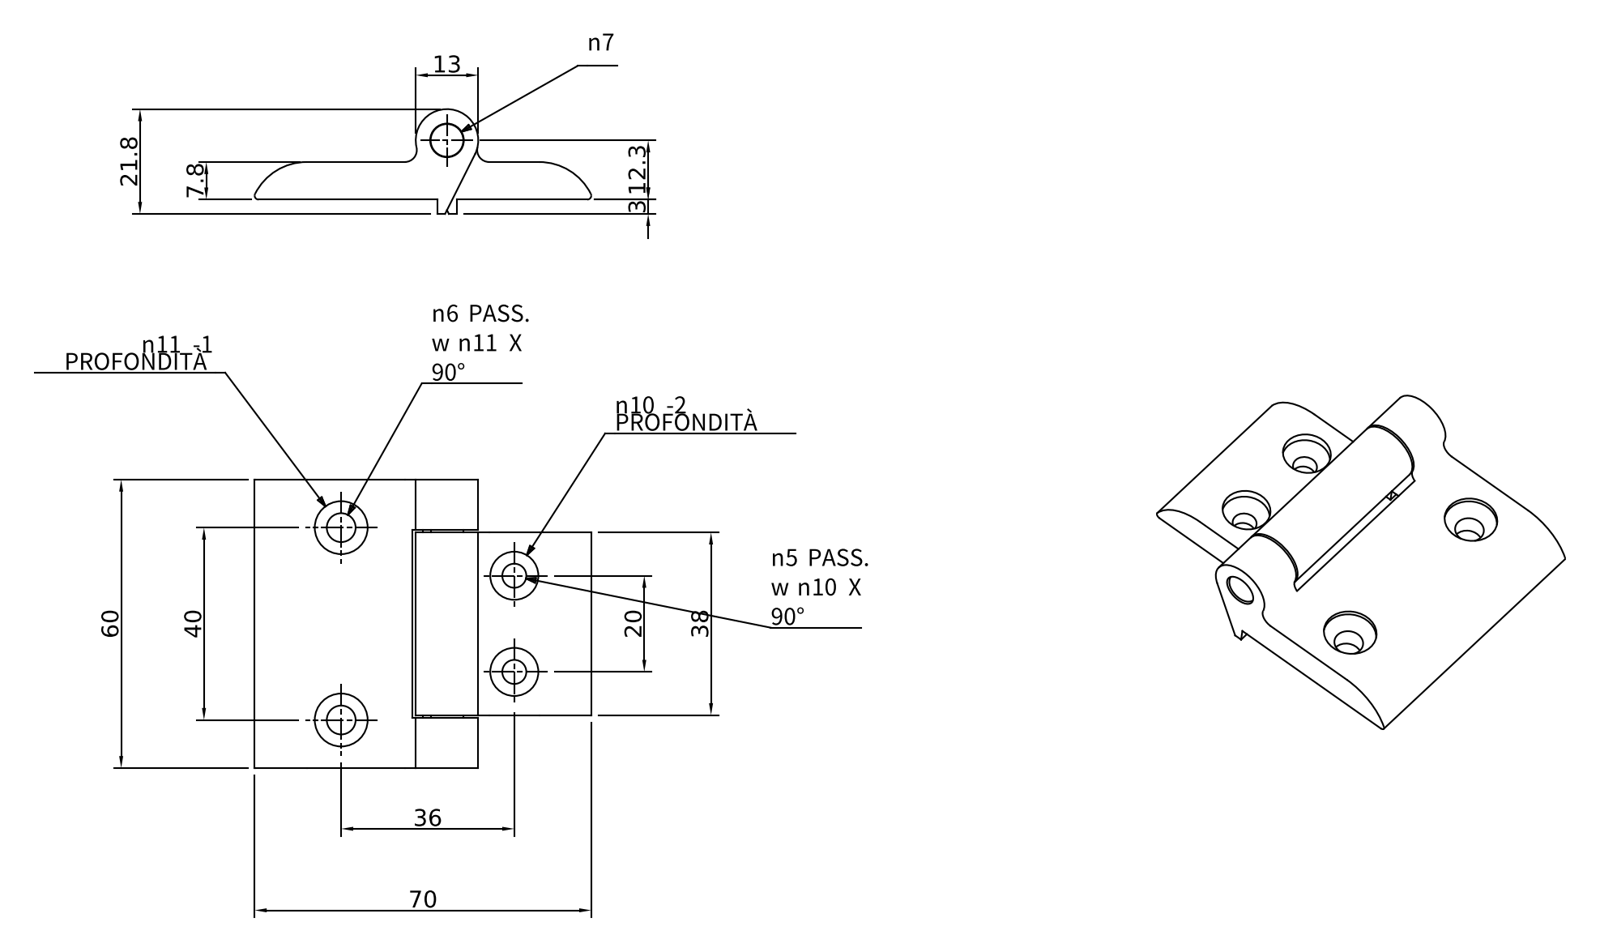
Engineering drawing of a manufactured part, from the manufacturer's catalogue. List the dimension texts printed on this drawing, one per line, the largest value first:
70
60
40
38
36
21.8
20
13
12.3
7.8
3
